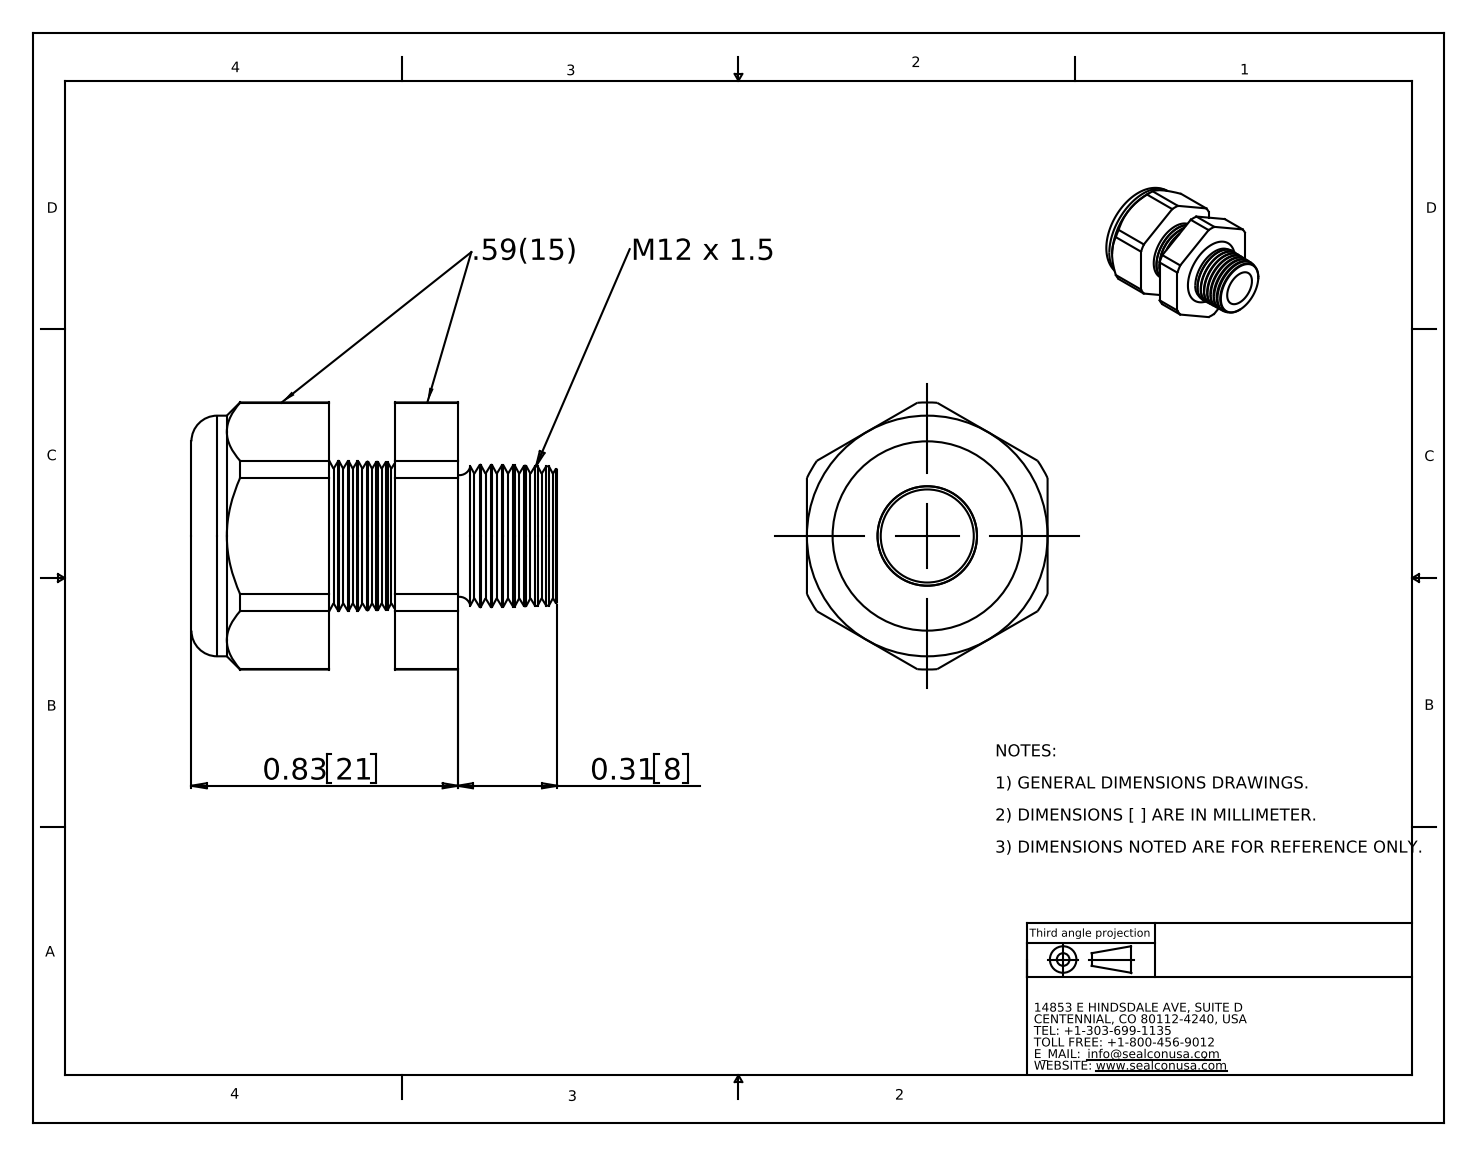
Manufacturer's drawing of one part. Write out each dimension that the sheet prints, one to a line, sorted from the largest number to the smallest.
0.83 21
0.31 8
